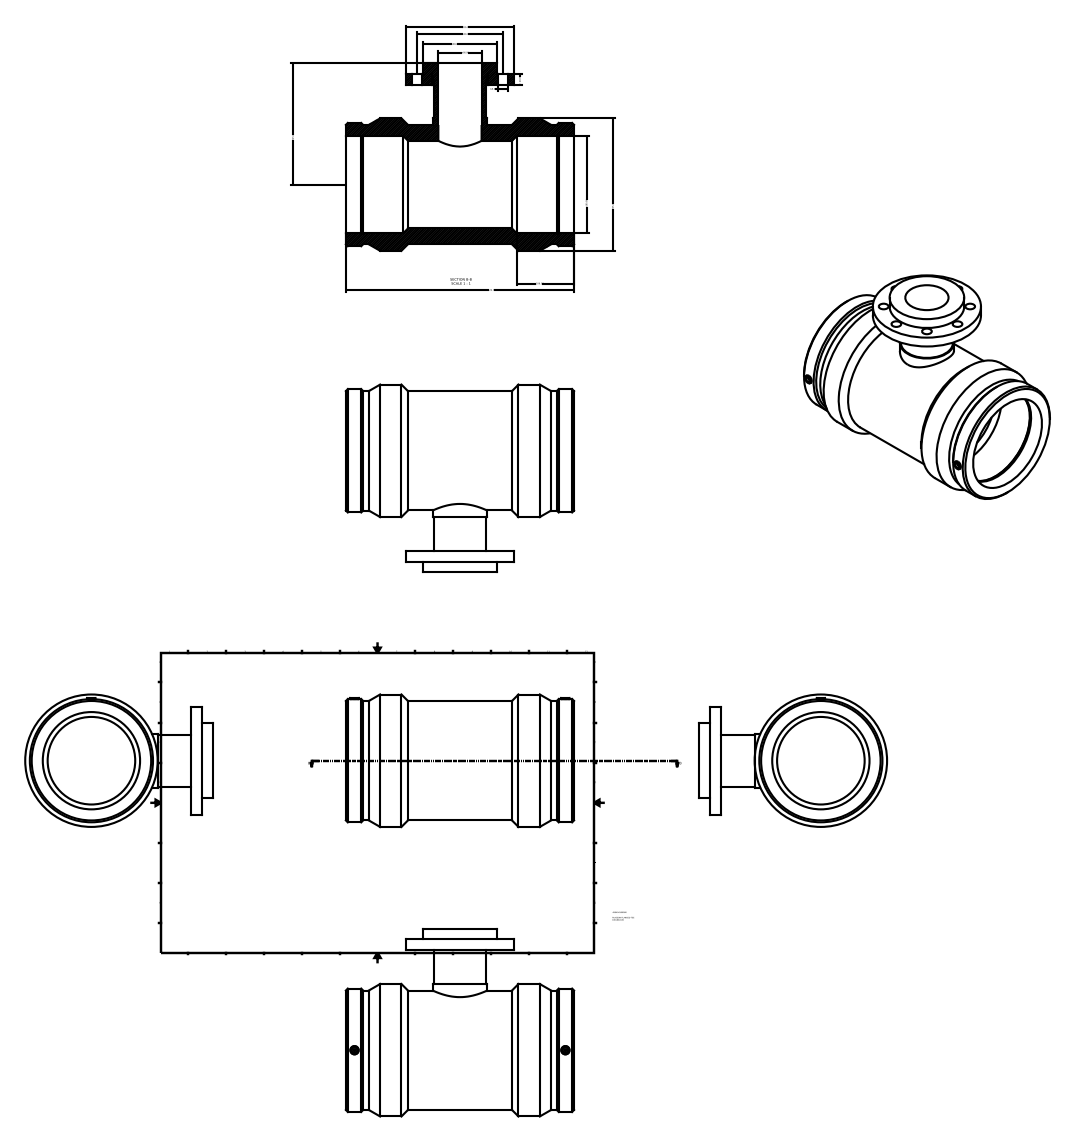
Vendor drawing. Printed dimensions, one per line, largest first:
422.00
245.00
225.00
200.00
n180.00
160.00
138.00
106.00
n80.00
20.00
18.00
